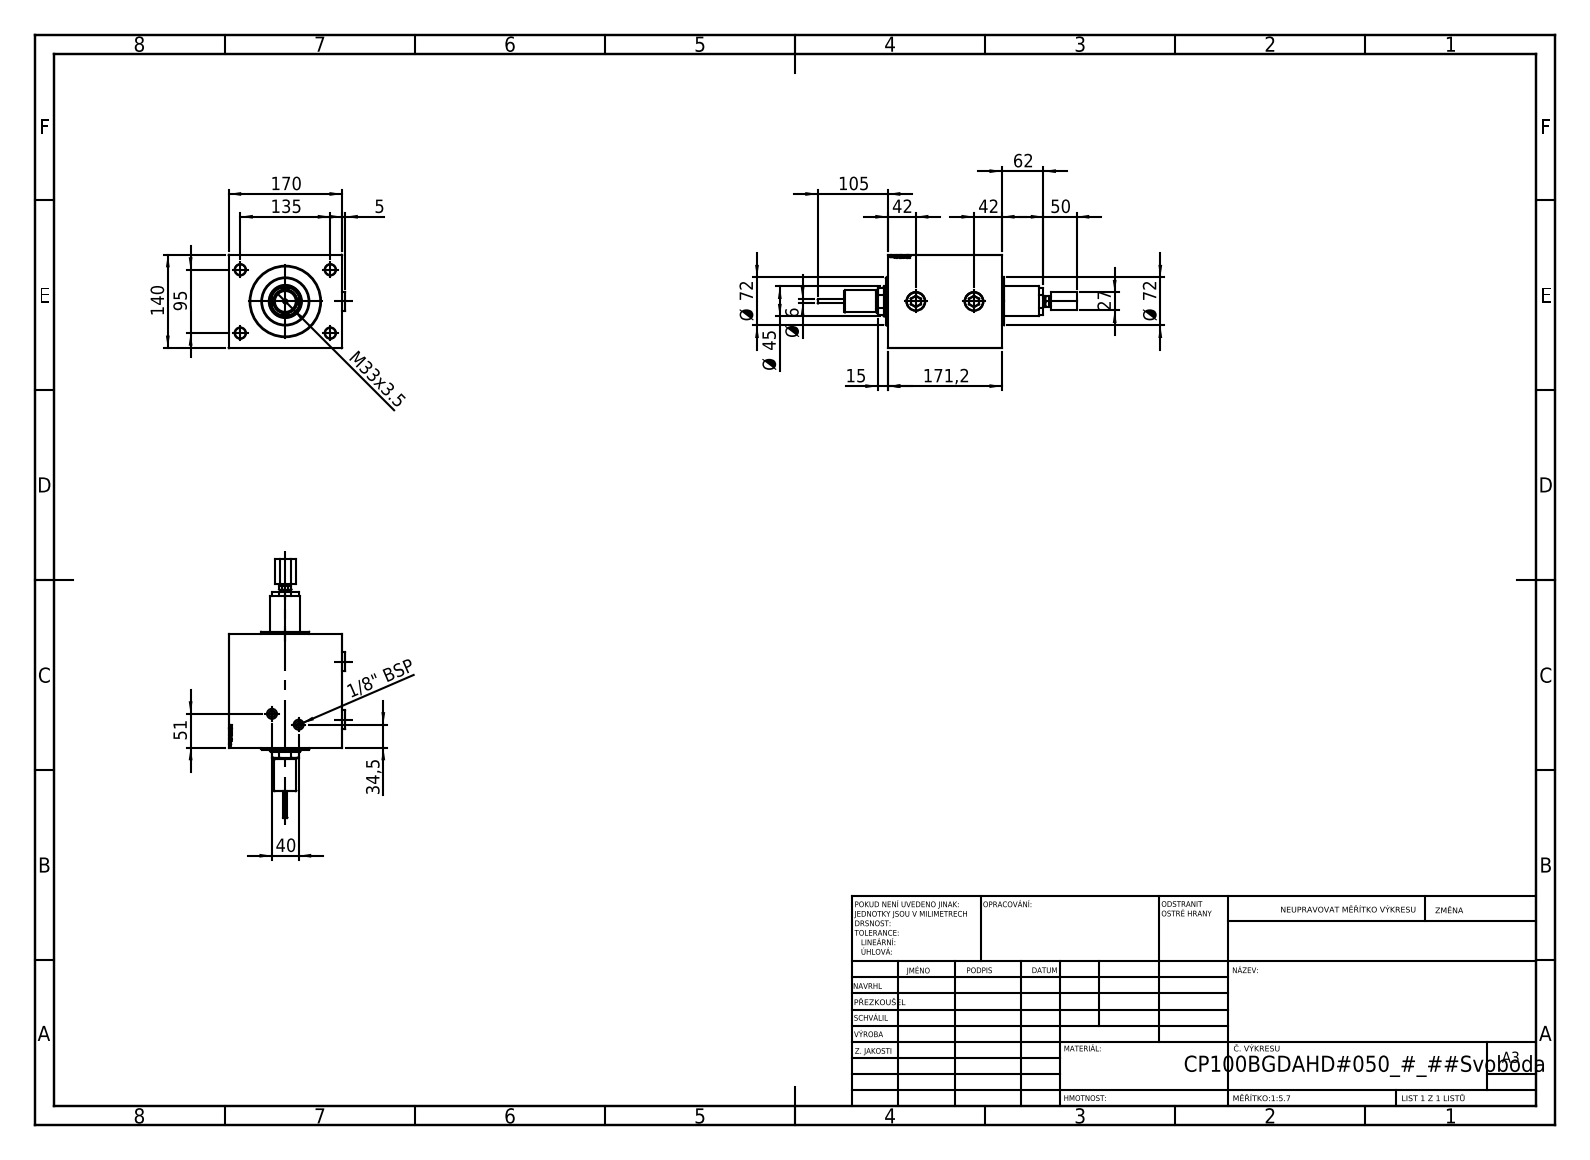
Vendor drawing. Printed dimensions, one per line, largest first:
171,2
170
140
135
105
95
Ø 72
Ø 72
62
51
50
Ø 45
42
42
40
34,5
M33x3.5
27
15
Ø 6
5
1/8" BSP
